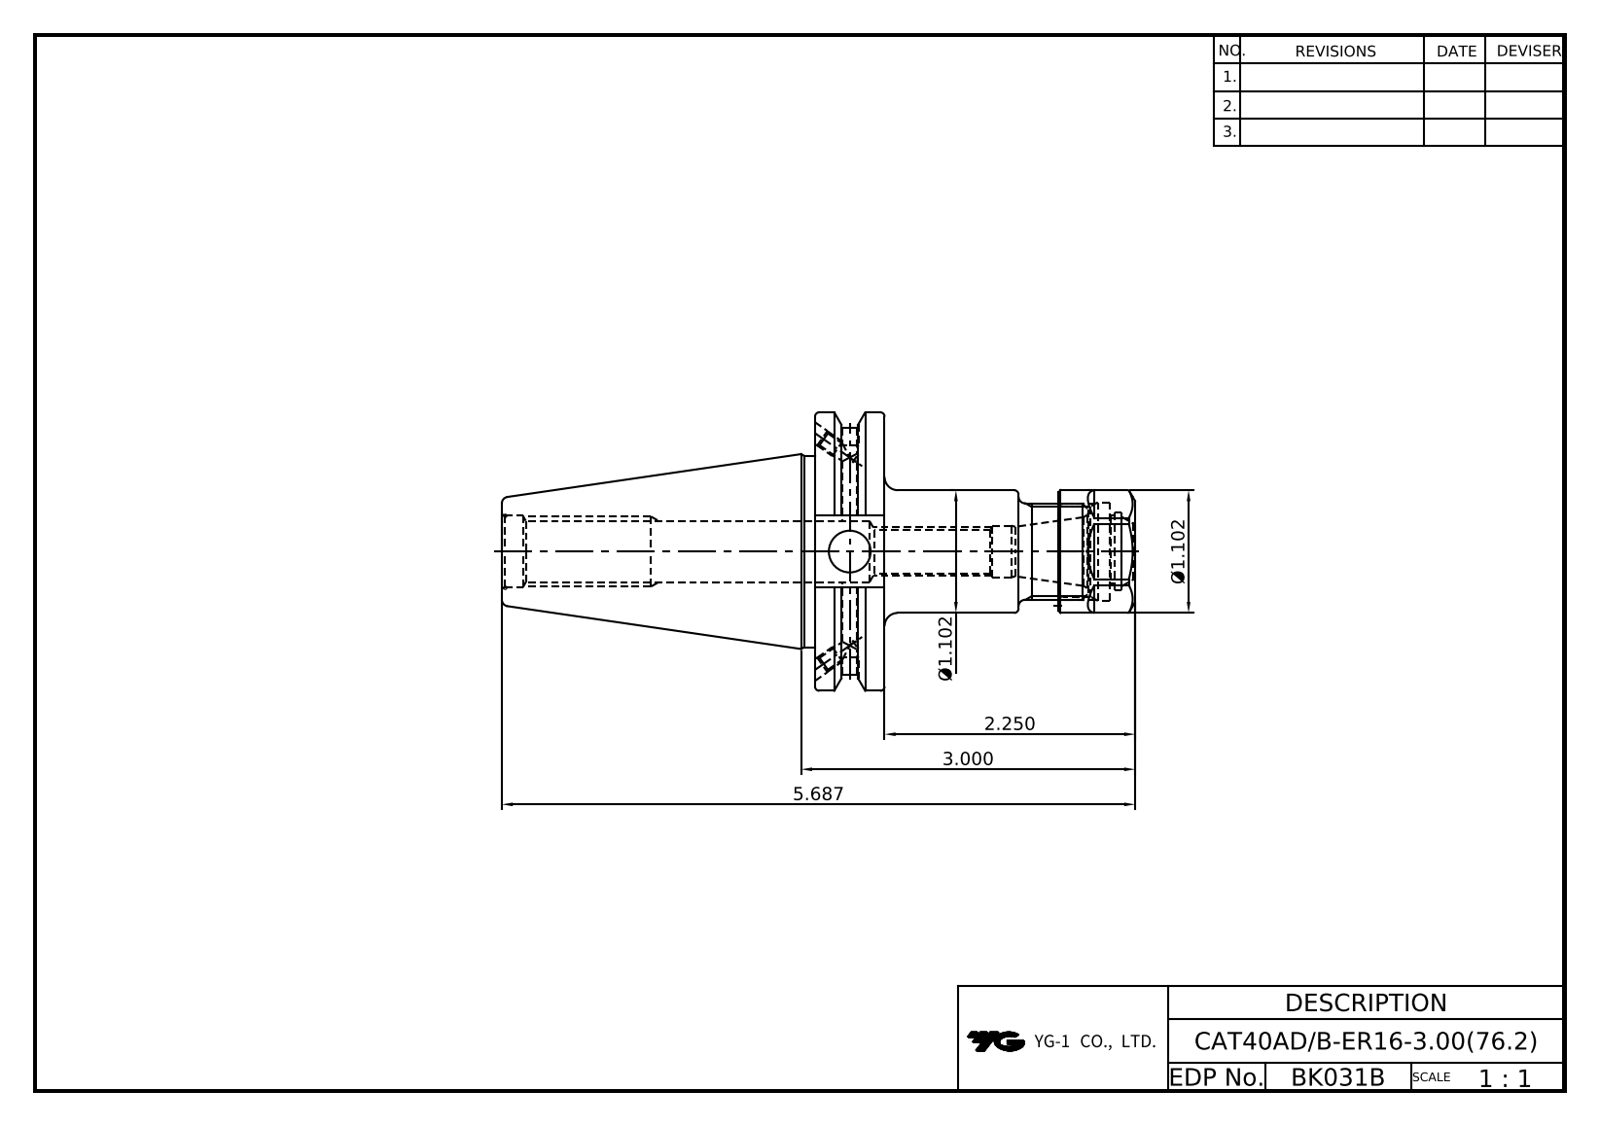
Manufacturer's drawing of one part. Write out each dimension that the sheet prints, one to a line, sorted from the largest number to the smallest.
5.687
3.000
2.250
Ø1.102
Ø1.102
